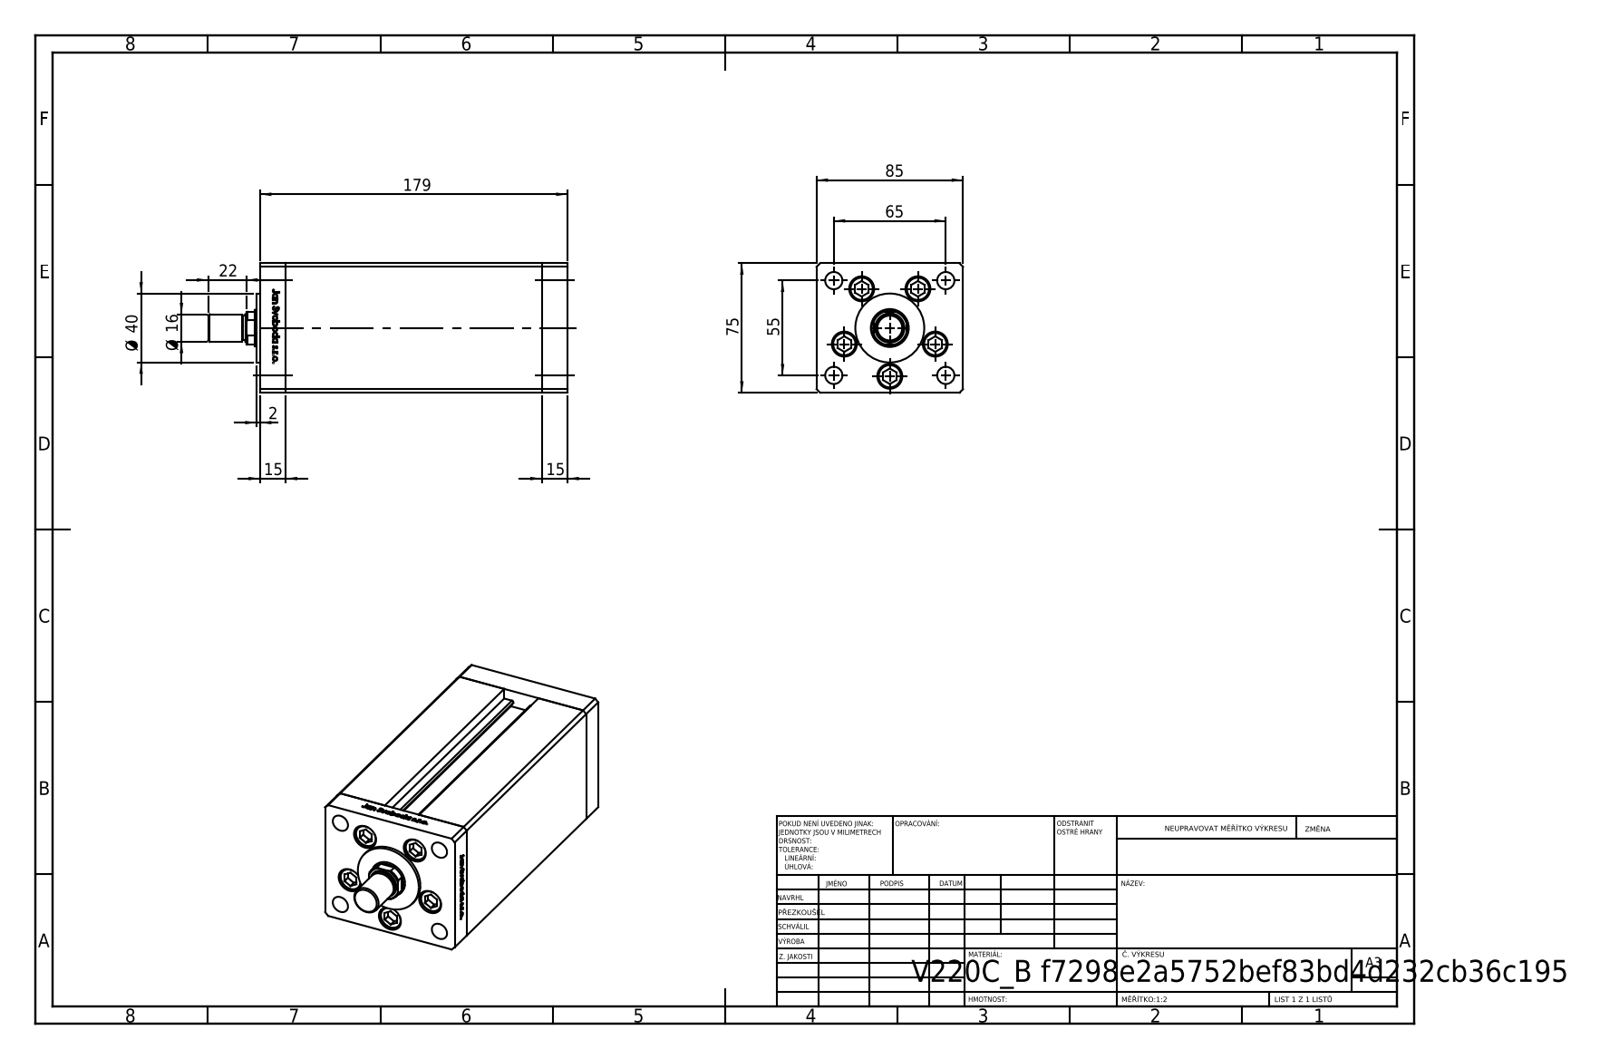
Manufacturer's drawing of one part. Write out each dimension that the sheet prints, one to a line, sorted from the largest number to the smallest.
179
85
75
65
55
Ø 40
22
Ø 16
15
15
2
